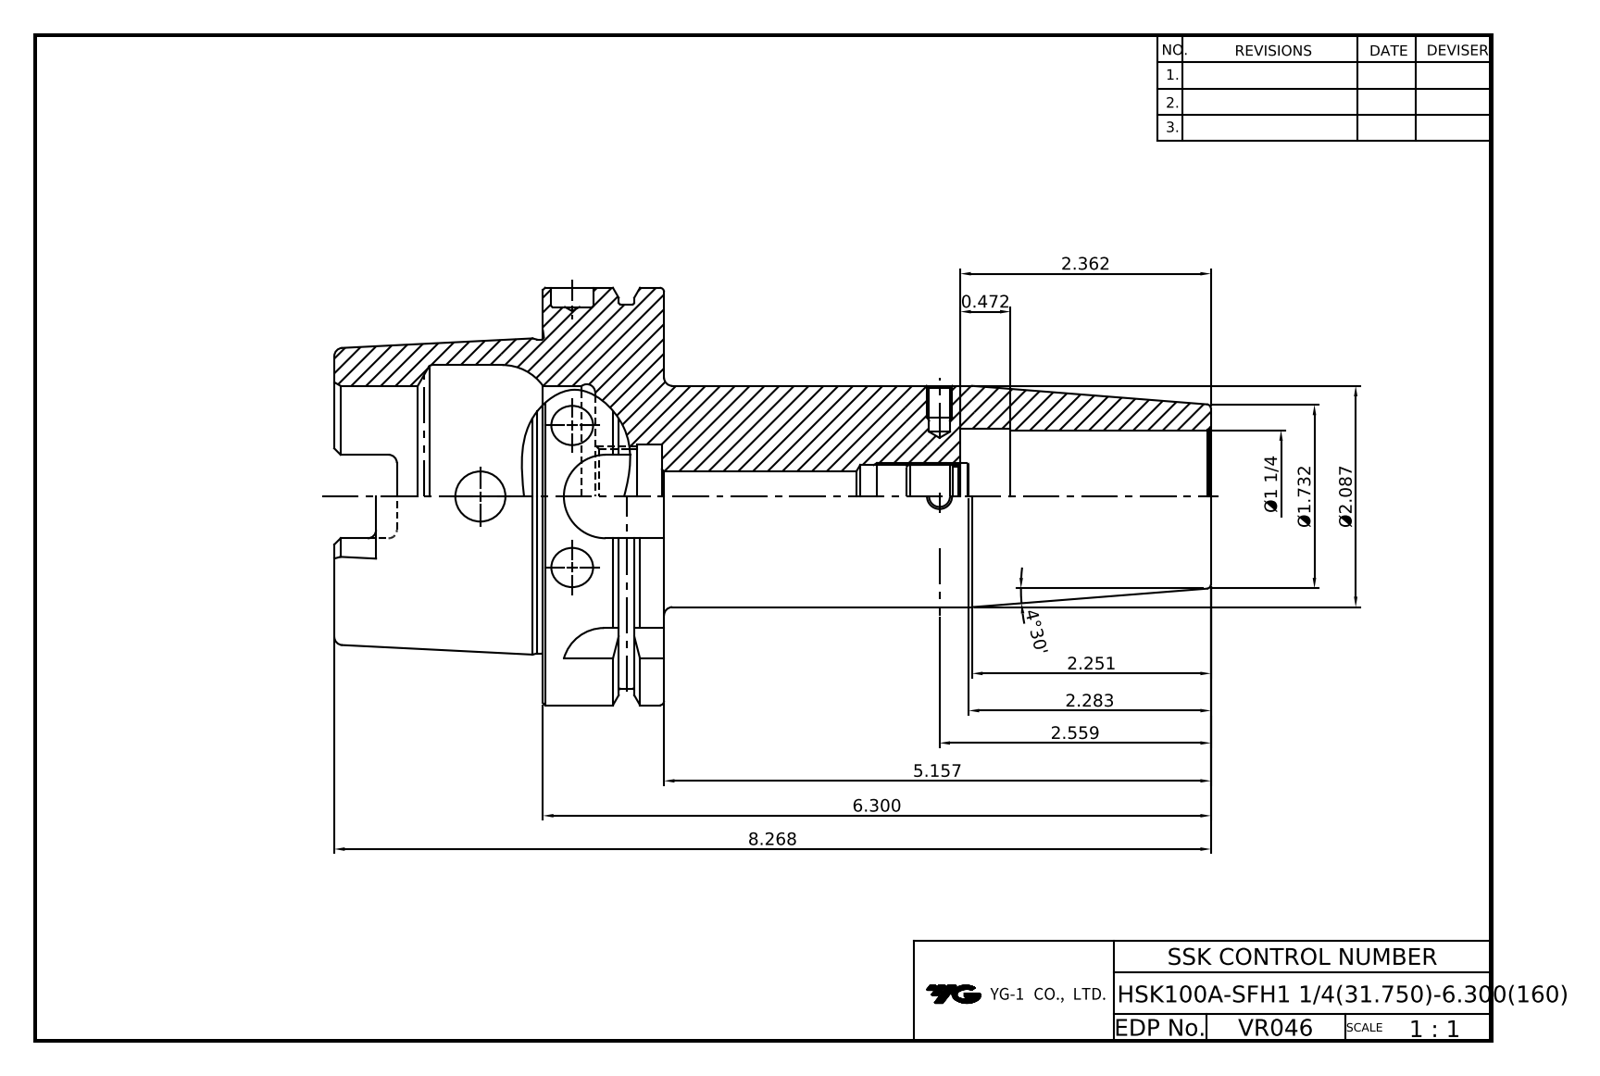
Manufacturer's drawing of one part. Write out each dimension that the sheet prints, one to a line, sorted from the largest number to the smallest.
8.268
6.300
5.157
4°30'
2.559
2.362
2.283
2.251
Ø2.087
Ø1.732
0.472
